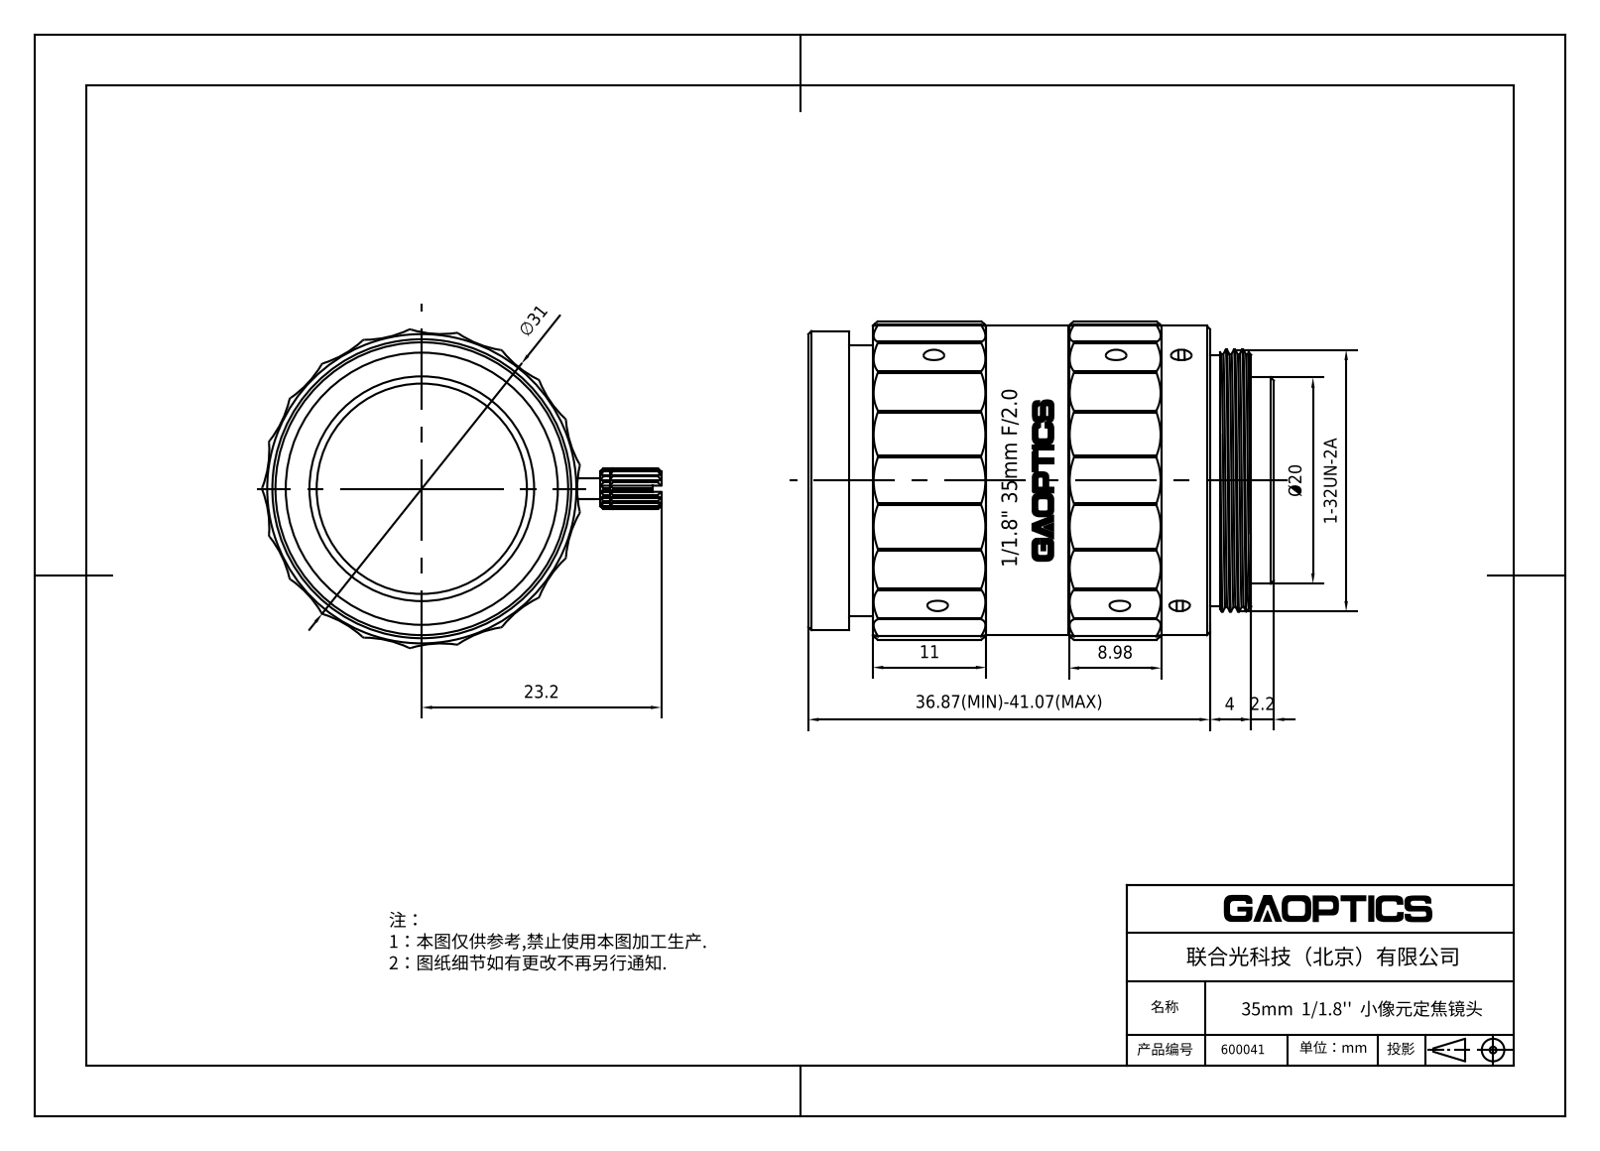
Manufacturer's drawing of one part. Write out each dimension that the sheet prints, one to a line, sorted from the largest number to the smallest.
36.87(MIN)-41.07(MAX)
∅31
23.2
Ø20
11
8.98
4
2.2
1-32UN-2A
